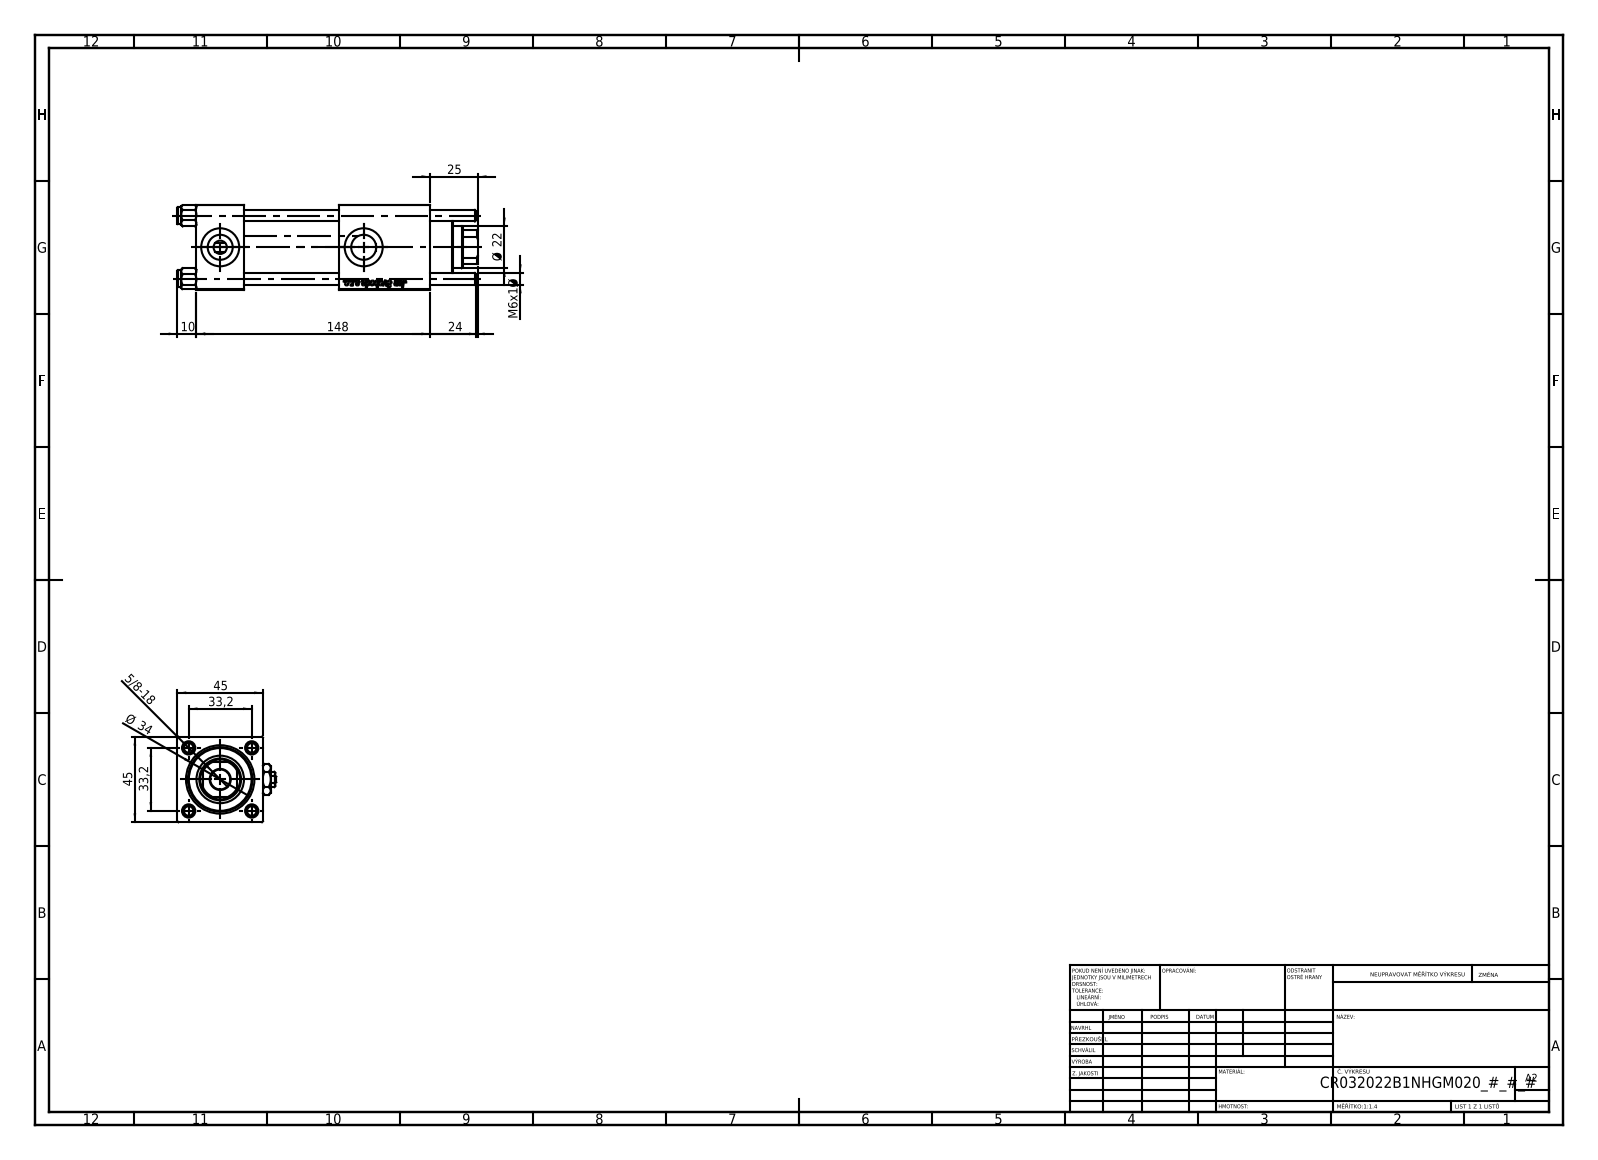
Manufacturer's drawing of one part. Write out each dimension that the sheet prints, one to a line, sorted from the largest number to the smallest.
148
45
45
Ø 34
33,2
33,2
25
24
Ø 22
10
M6x1 Ø
5/8-18
